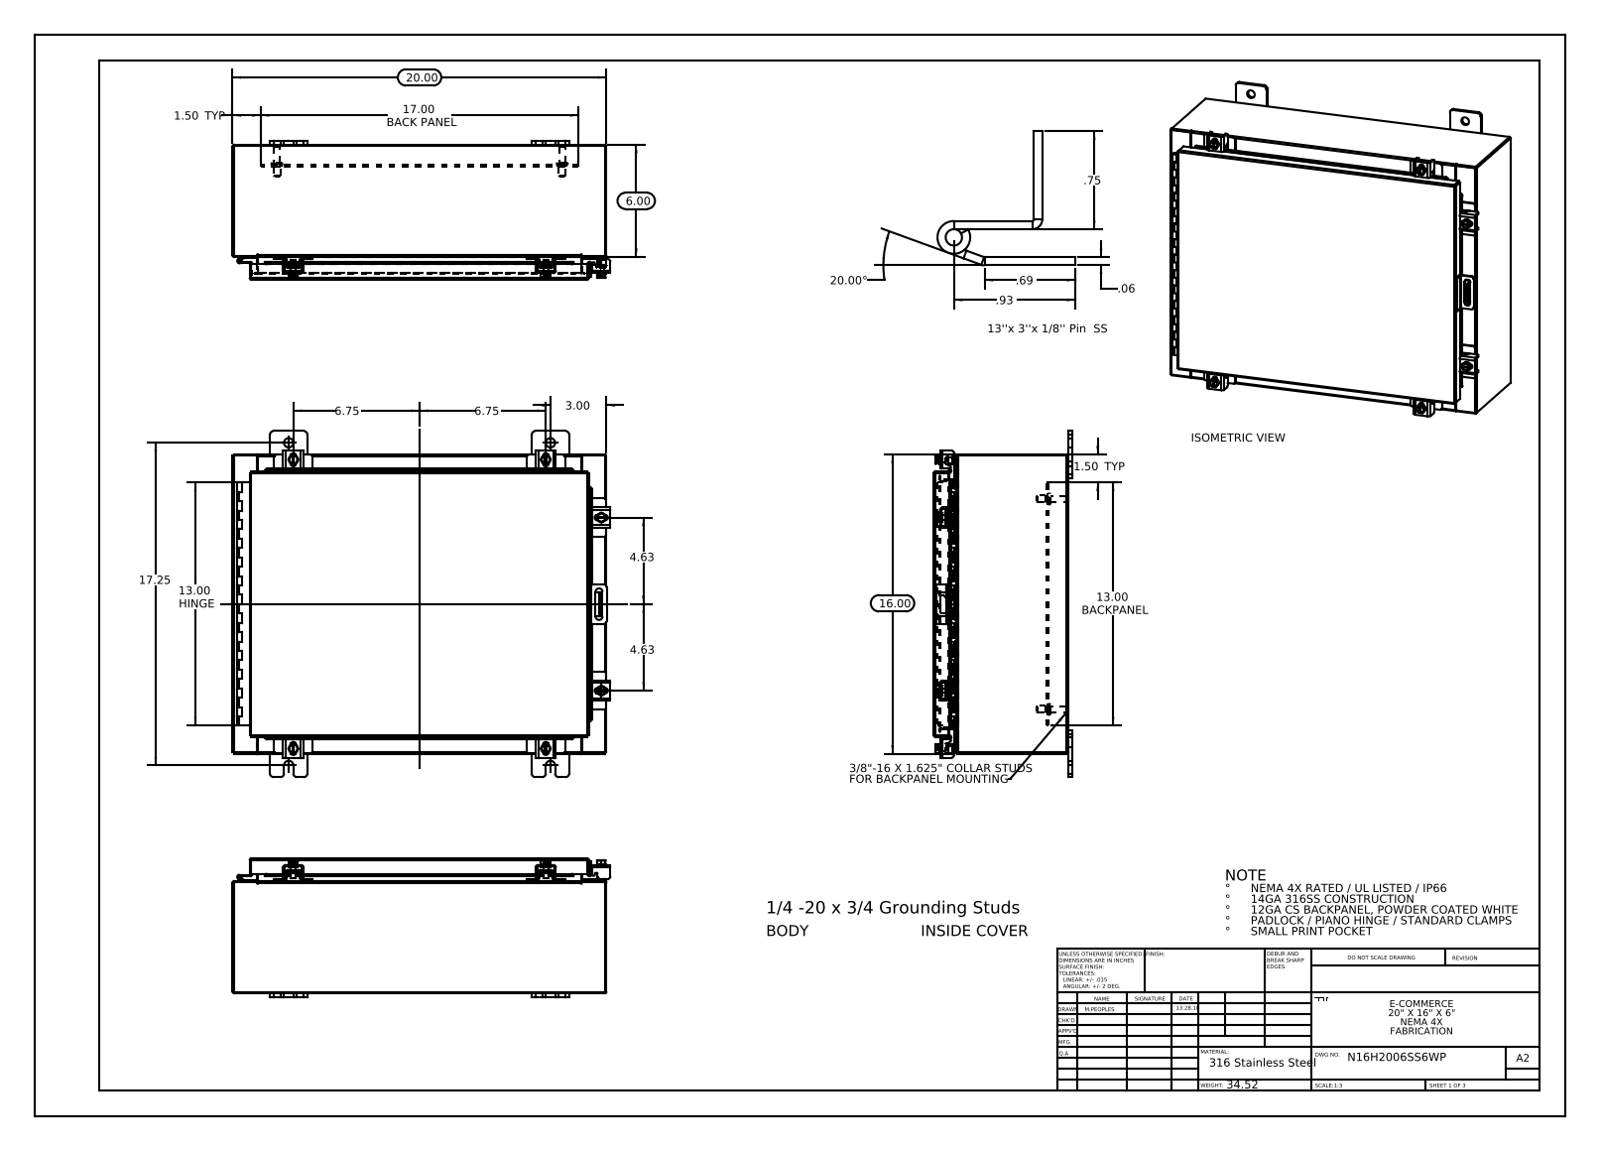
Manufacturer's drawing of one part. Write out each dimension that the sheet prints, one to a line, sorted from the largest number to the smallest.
20.00
20.00°
17.25
17.00 BACK PANEL
16.00
13.00 HINGE
13.00 BACKPANEL
6.75
6.75
6.00
4.63
4.63
3.00
1.50 TYP
1.50 TYP
.93
.75
.69
.06
